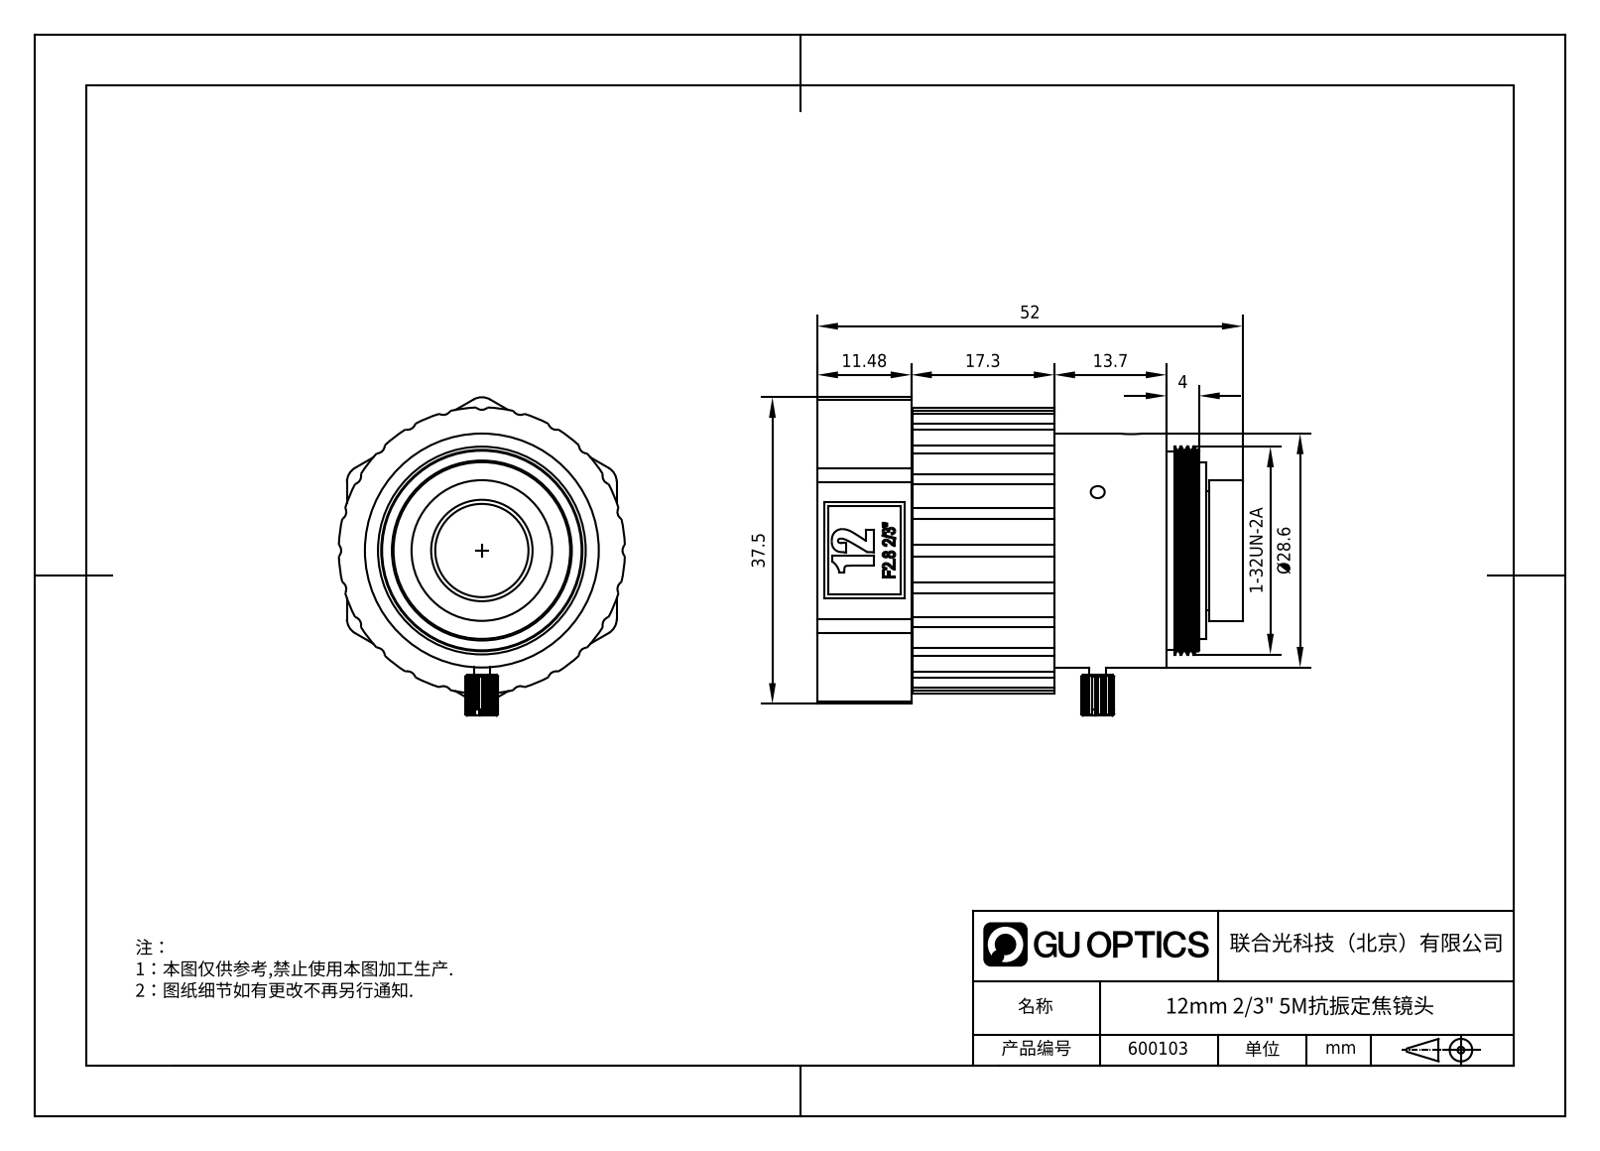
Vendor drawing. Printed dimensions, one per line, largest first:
52
37.5
Ø28.6
17.3
13.7
11.48
4
1-32UN-2A
